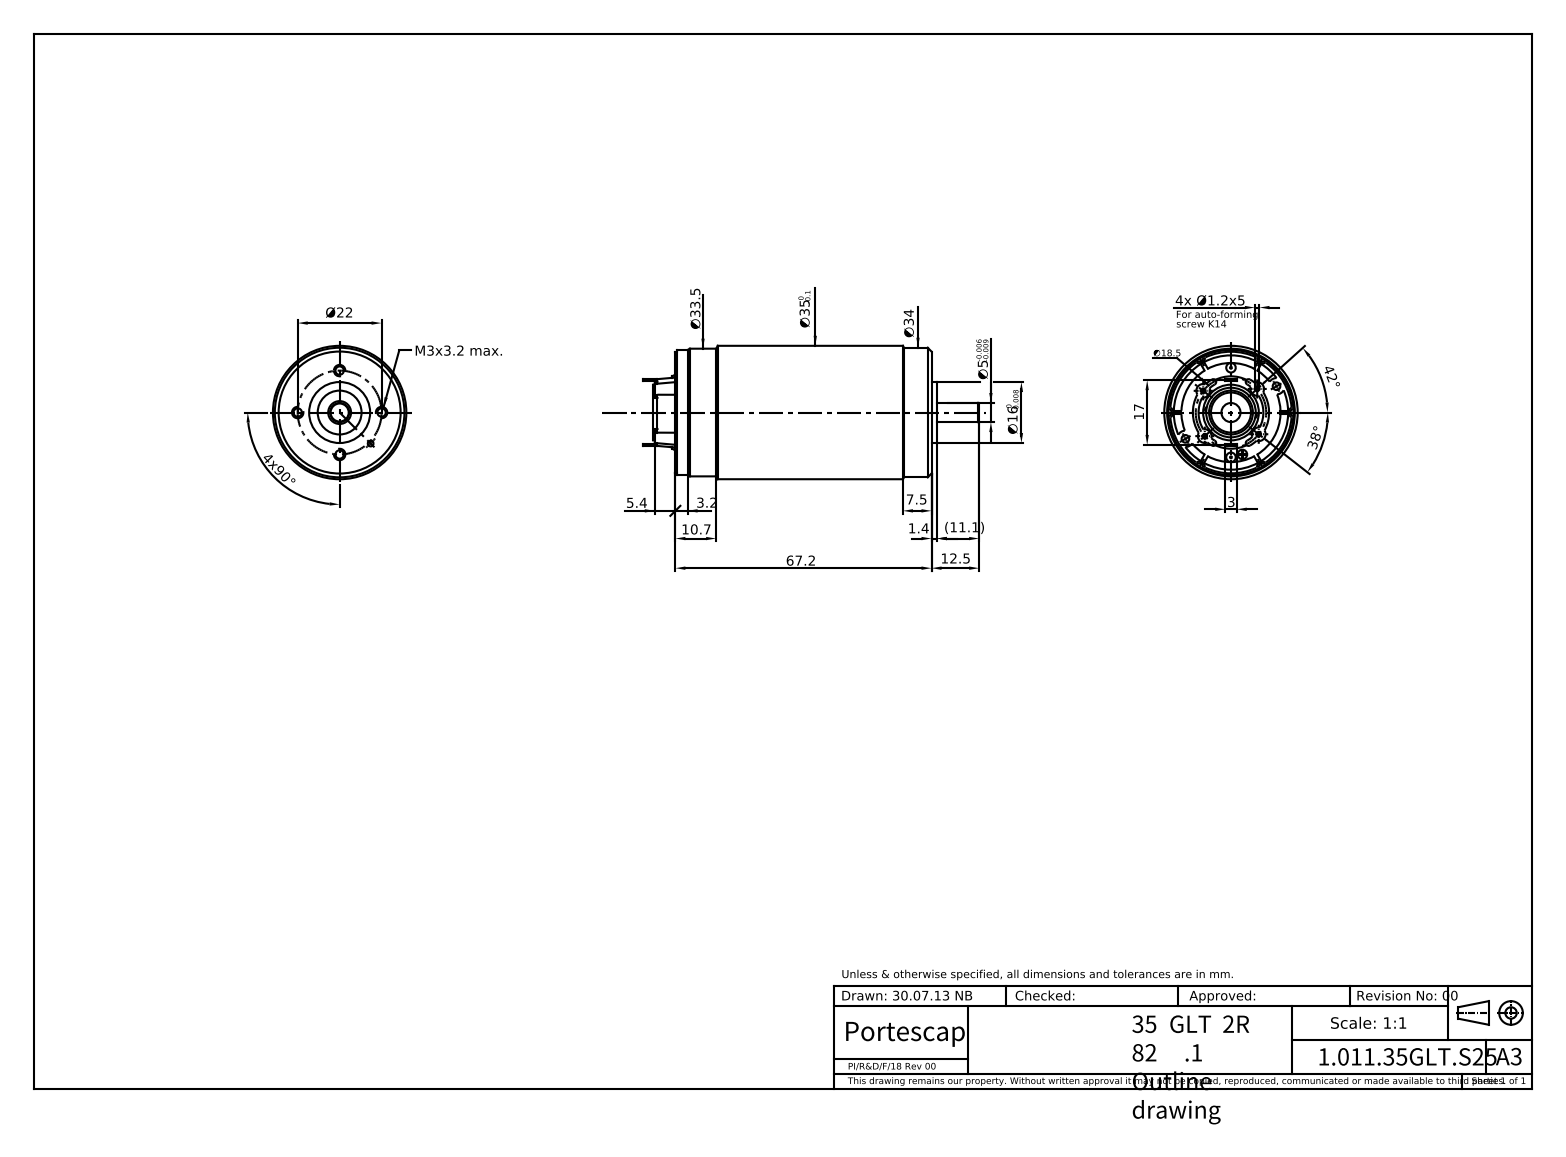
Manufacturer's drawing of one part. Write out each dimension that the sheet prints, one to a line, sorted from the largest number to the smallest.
4x90°
67.2
Ø22
17
12.5
10.7
7.5
3
1.4
4x Ø1.2x5
